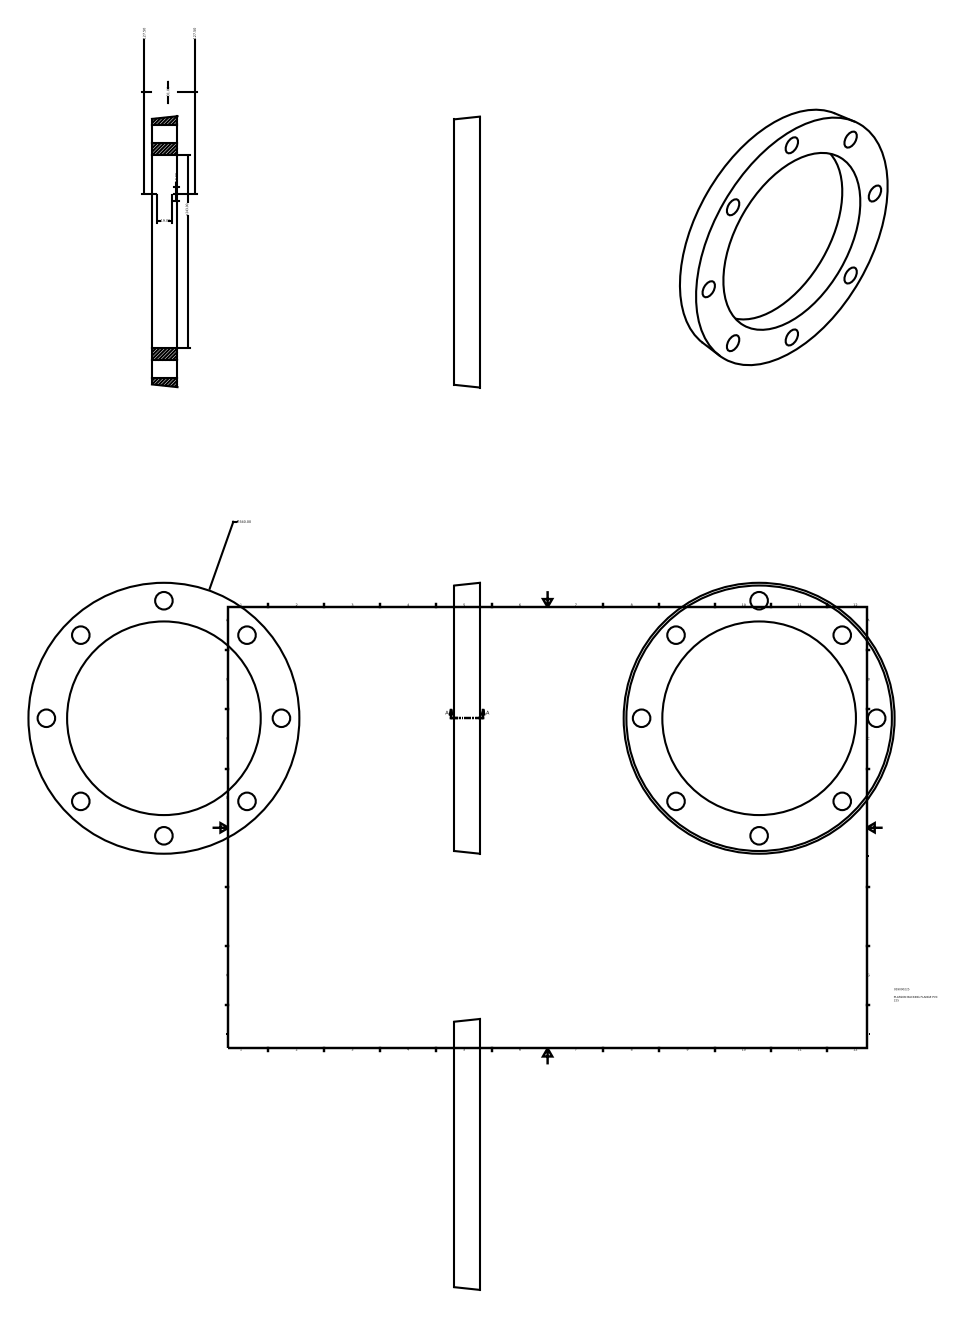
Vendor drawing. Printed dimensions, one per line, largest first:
∅340.00
n243.00
127.50
127.50
31.00
19.00
18.00
